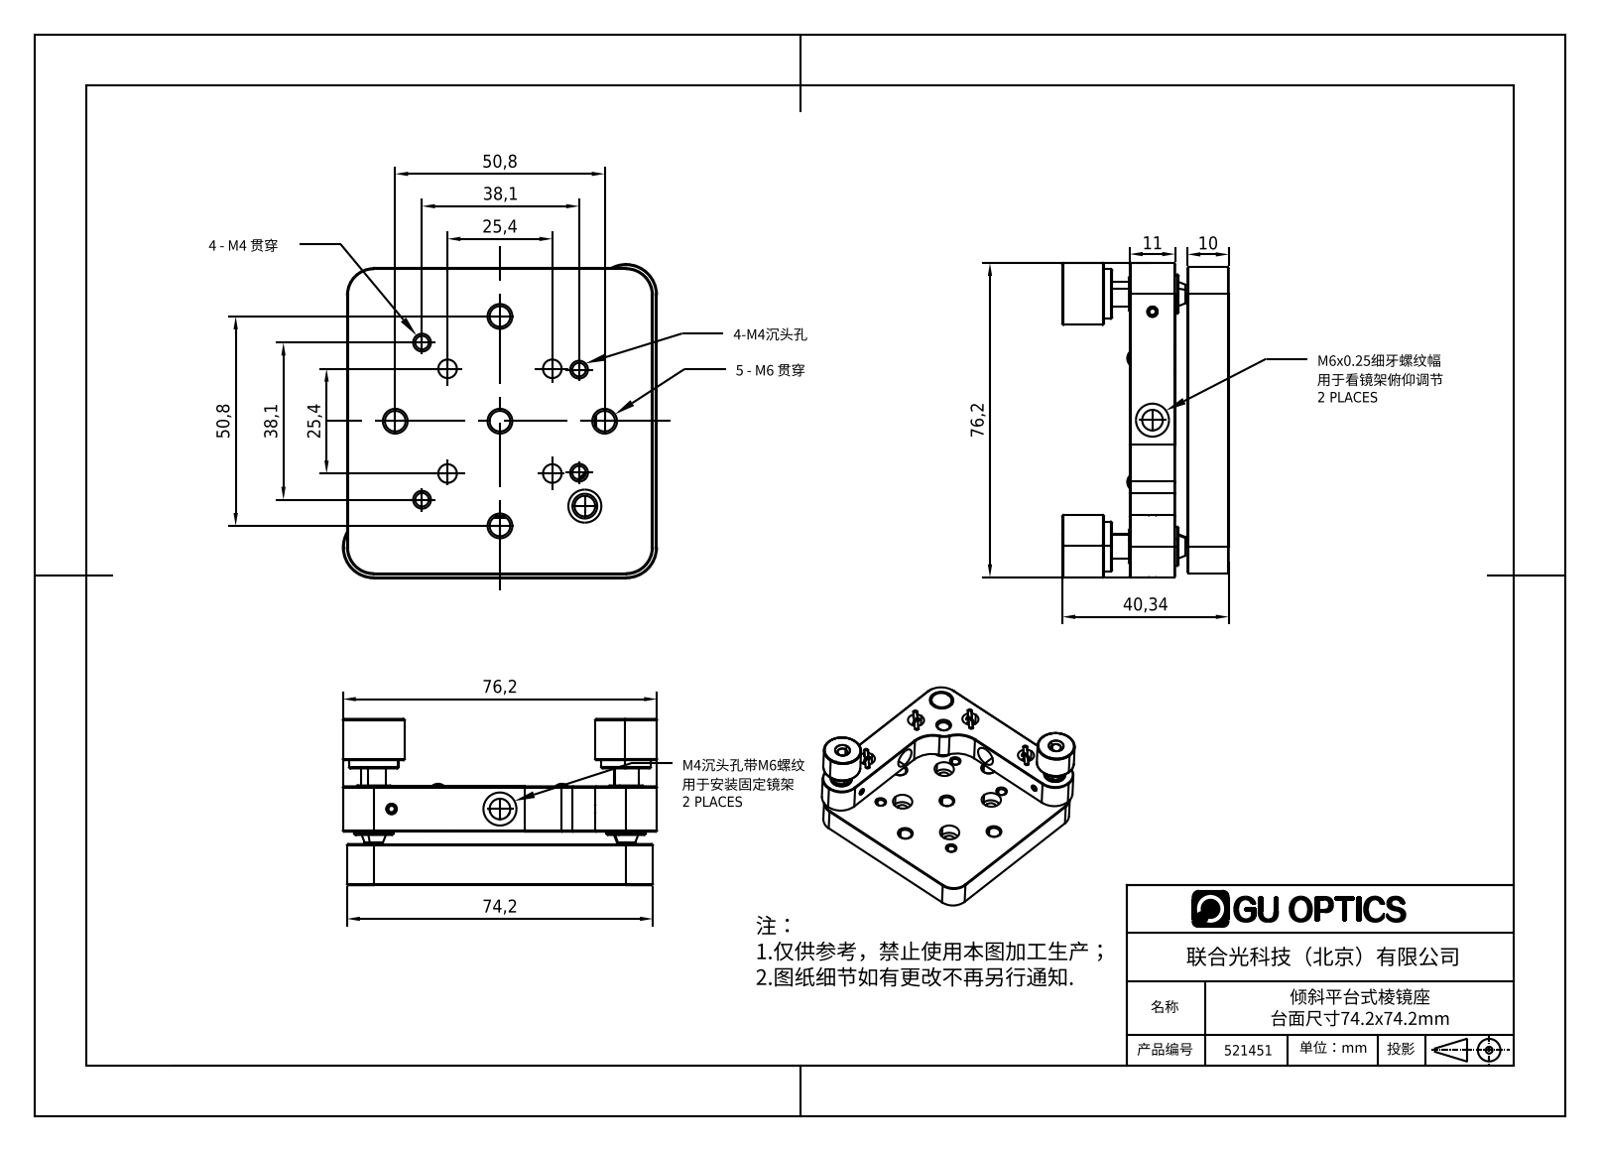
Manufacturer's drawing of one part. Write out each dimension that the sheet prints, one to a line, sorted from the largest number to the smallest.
76,2
76,2
74,2
50,8
50,8
40,34
38,1
38,1
25,4
25,4
11
10
